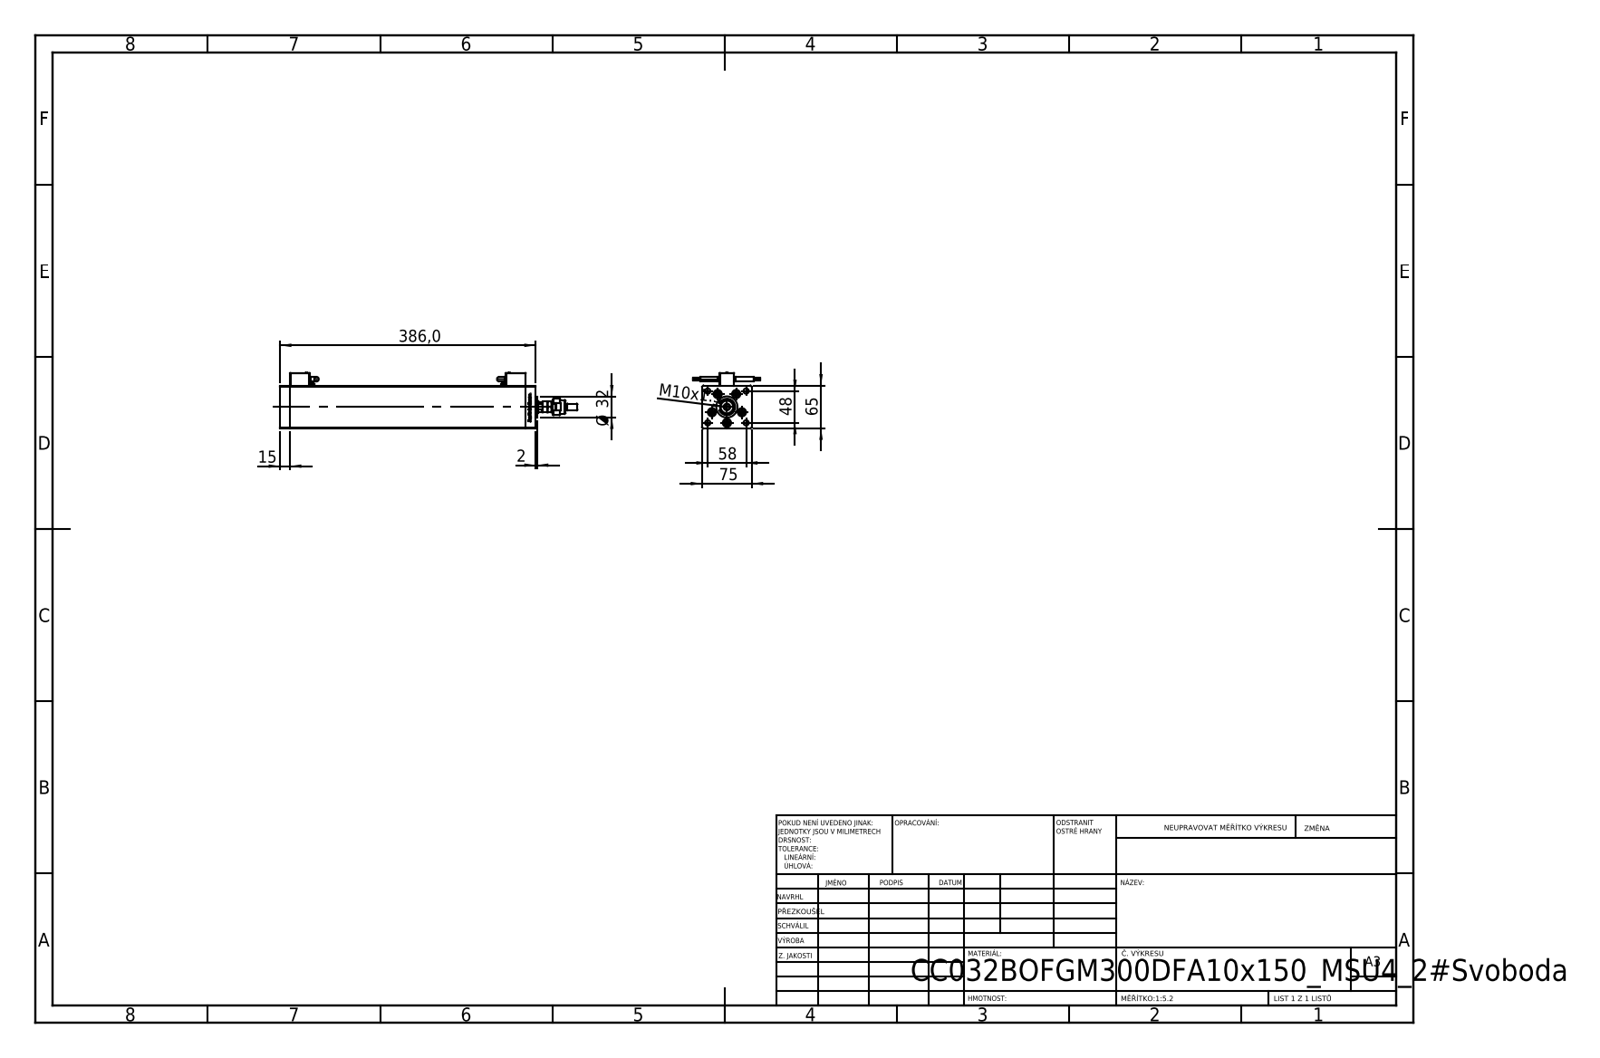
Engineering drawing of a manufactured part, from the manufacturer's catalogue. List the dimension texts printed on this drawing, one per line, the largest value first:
386,0
75
65
58
48
Ø 32
15
M10x1.5
2
